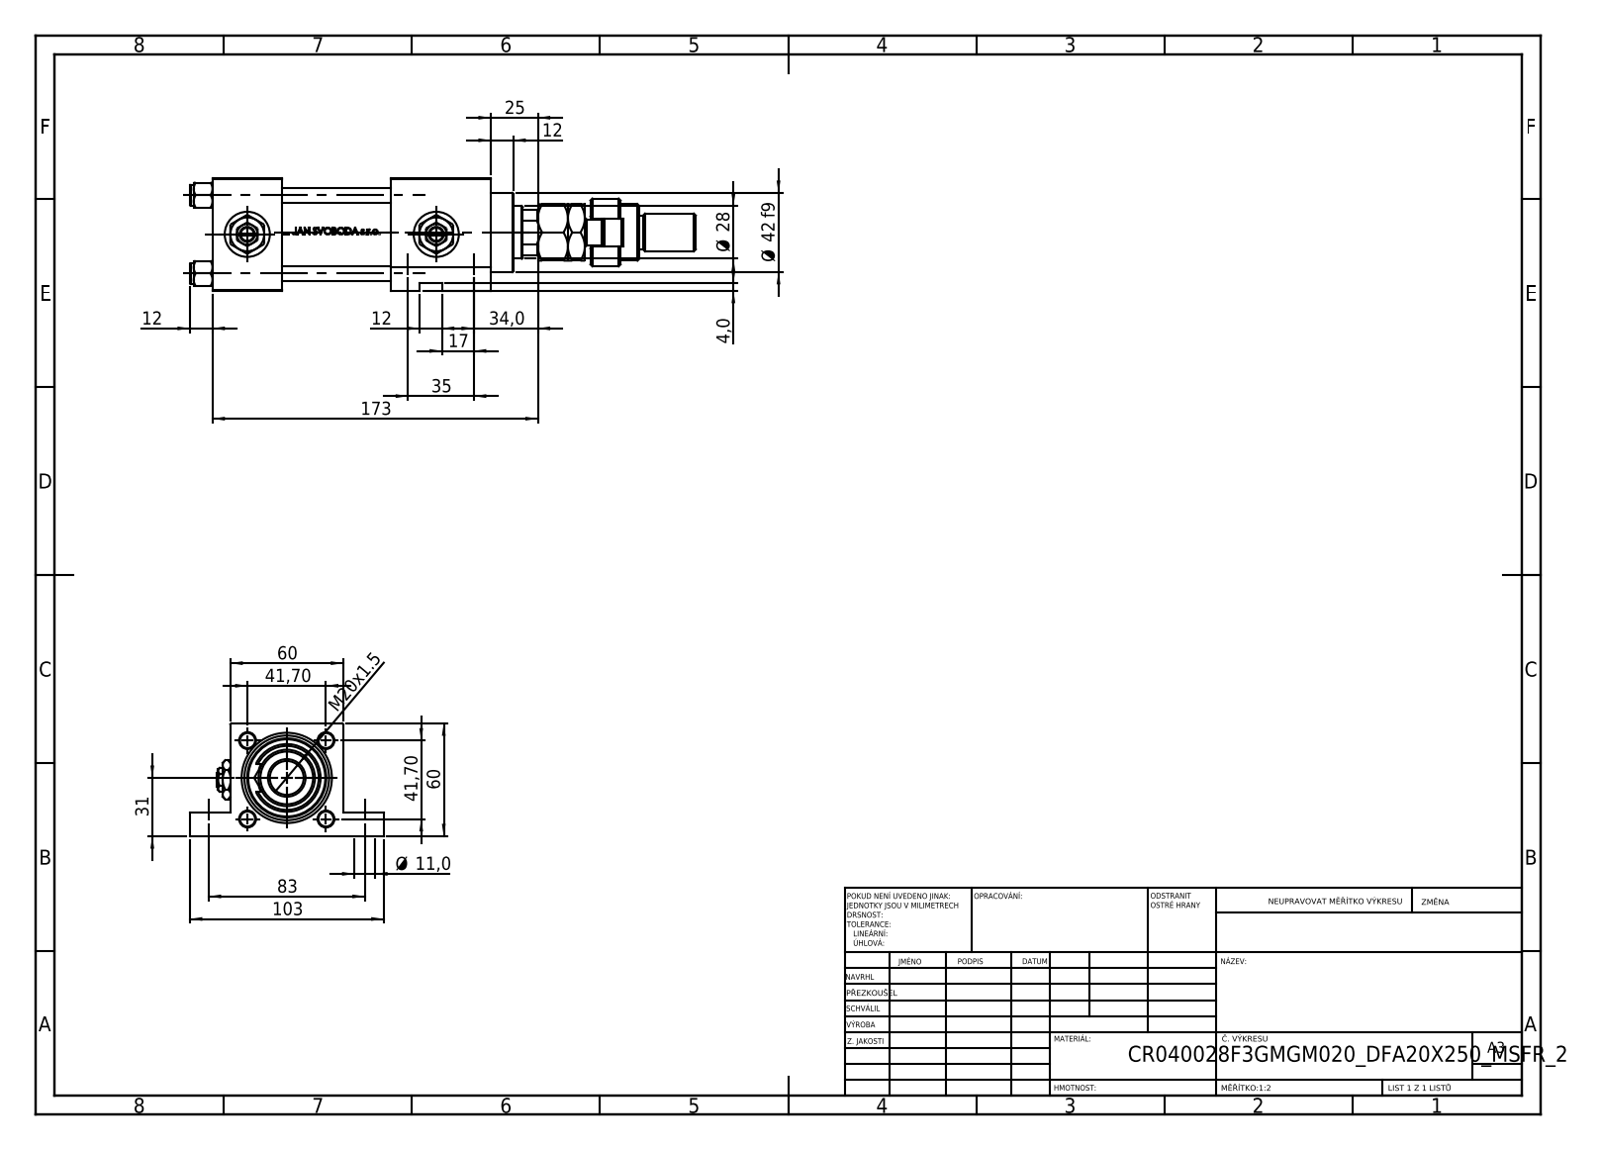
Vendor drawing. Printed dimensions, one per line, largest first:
173
103
83
60
60
Ø 42 f9
41,70
41,70
35
34,0
31
Ø 28
25
M20x1.5
17
12
12
12
Ø 11,0
4,0
